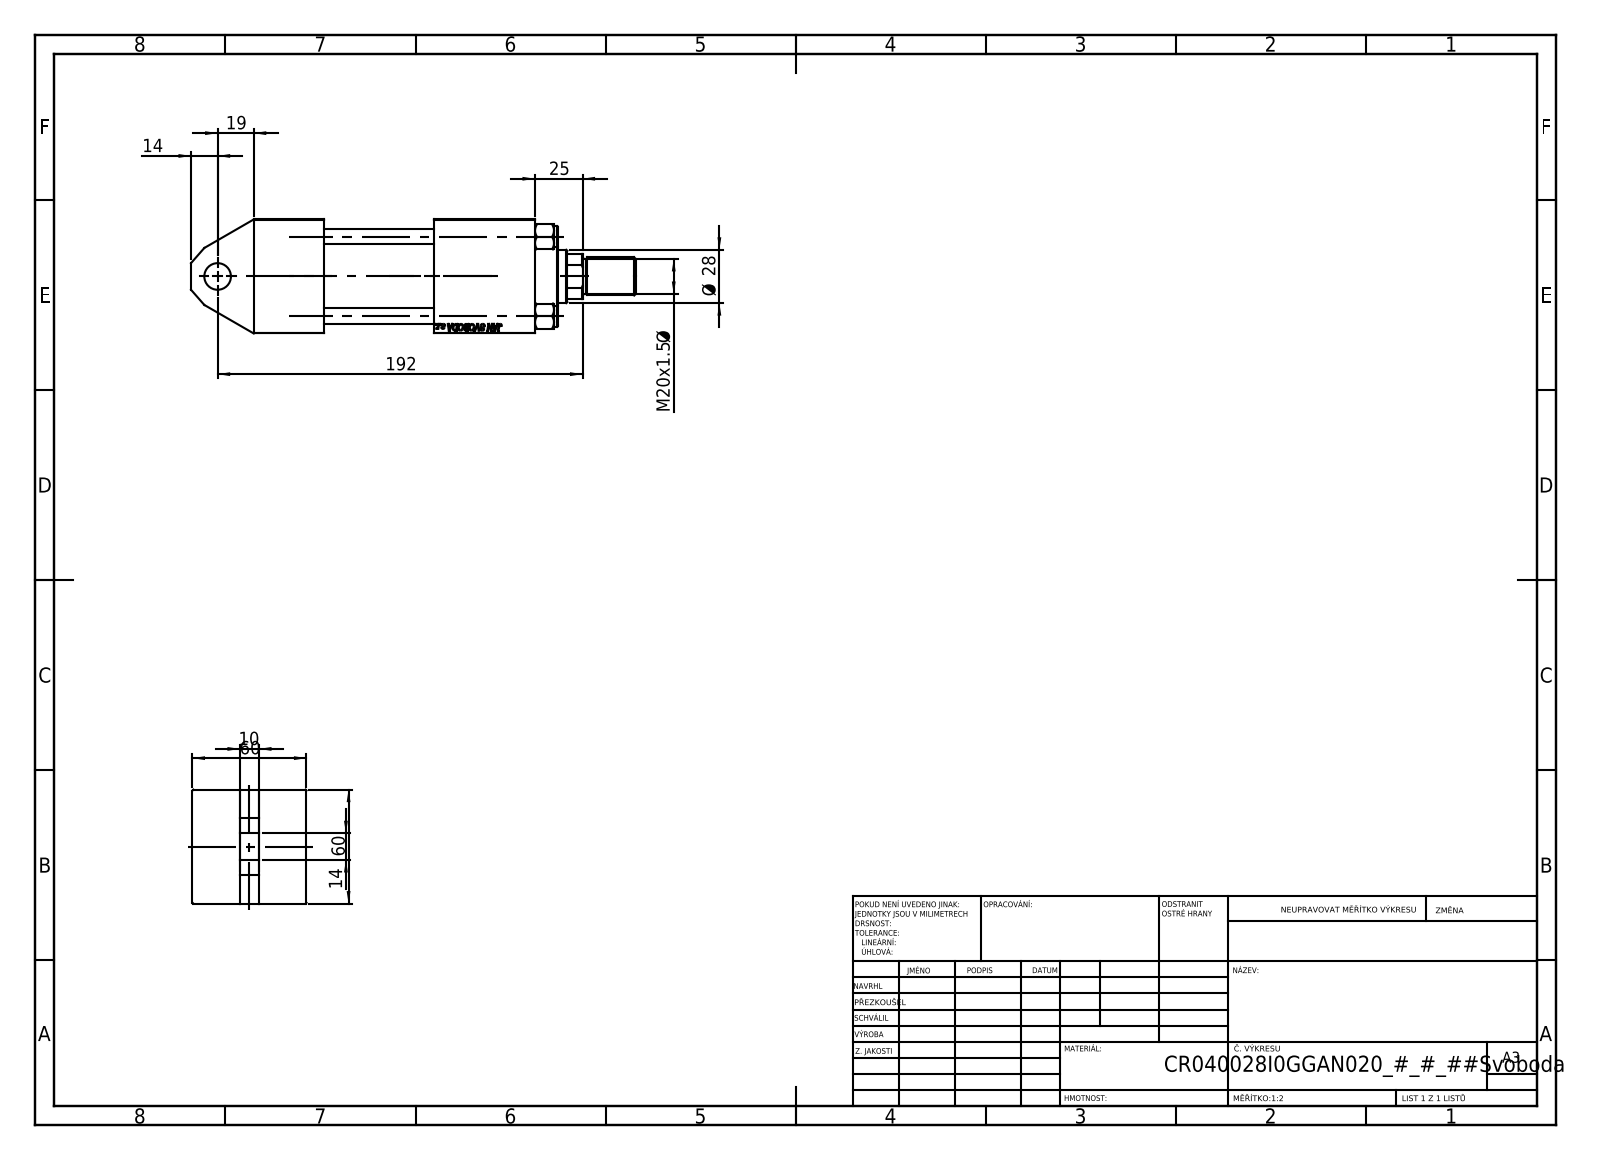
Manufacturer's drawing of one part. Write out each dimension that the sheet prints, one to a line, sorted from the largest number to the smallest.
192
60
60
Ø 28
25
M20x1.5 Ø
19
14
14
10
